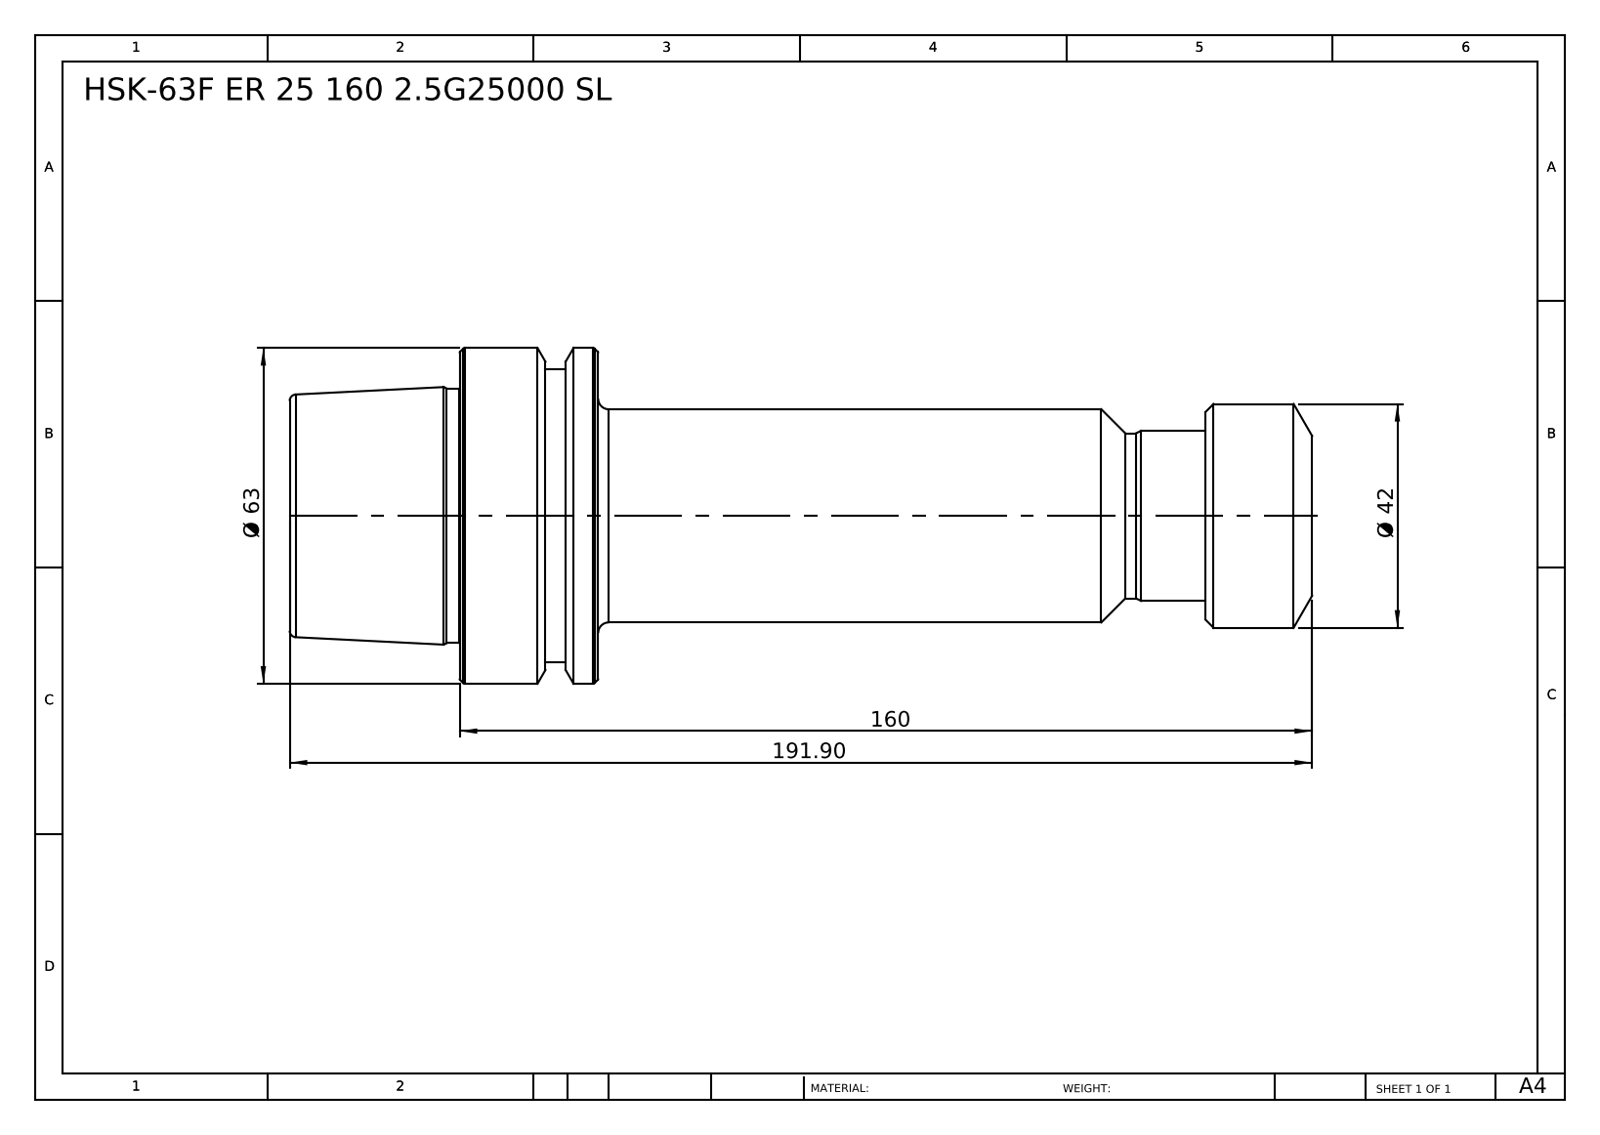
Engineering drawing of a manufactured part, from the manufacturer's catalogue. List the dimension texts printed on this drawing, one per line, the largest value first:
191.90
160
Ø 63
Ø 42
